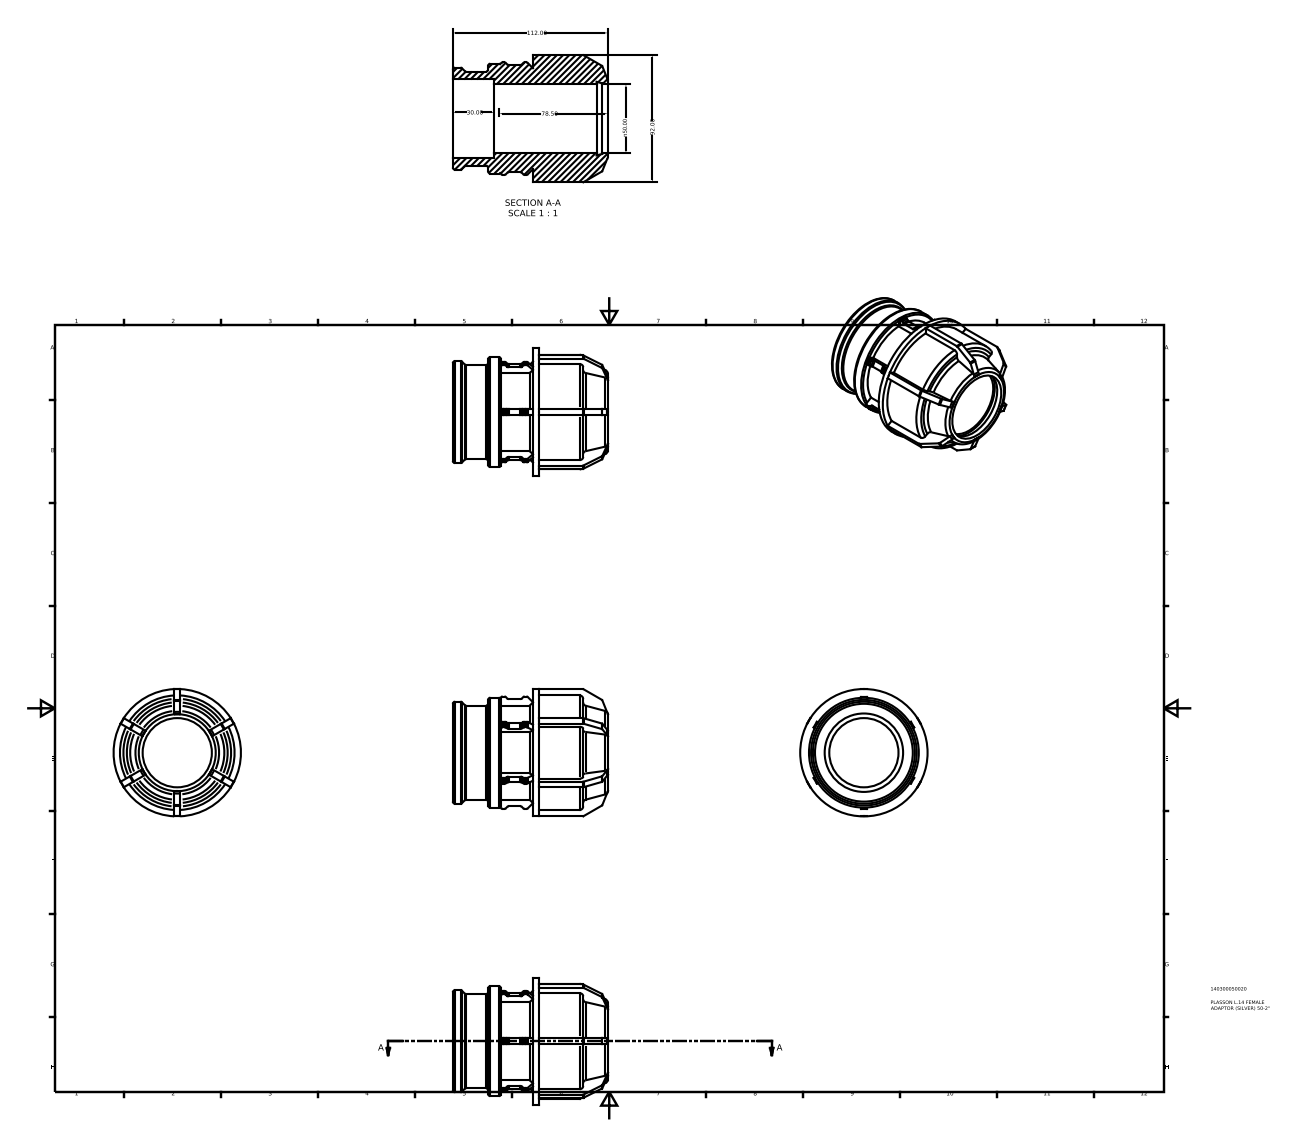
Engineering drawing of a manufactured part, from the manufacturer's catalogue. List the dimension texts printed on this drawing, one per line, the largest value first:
112.00
92.00
78.50
n50.00
30.00
